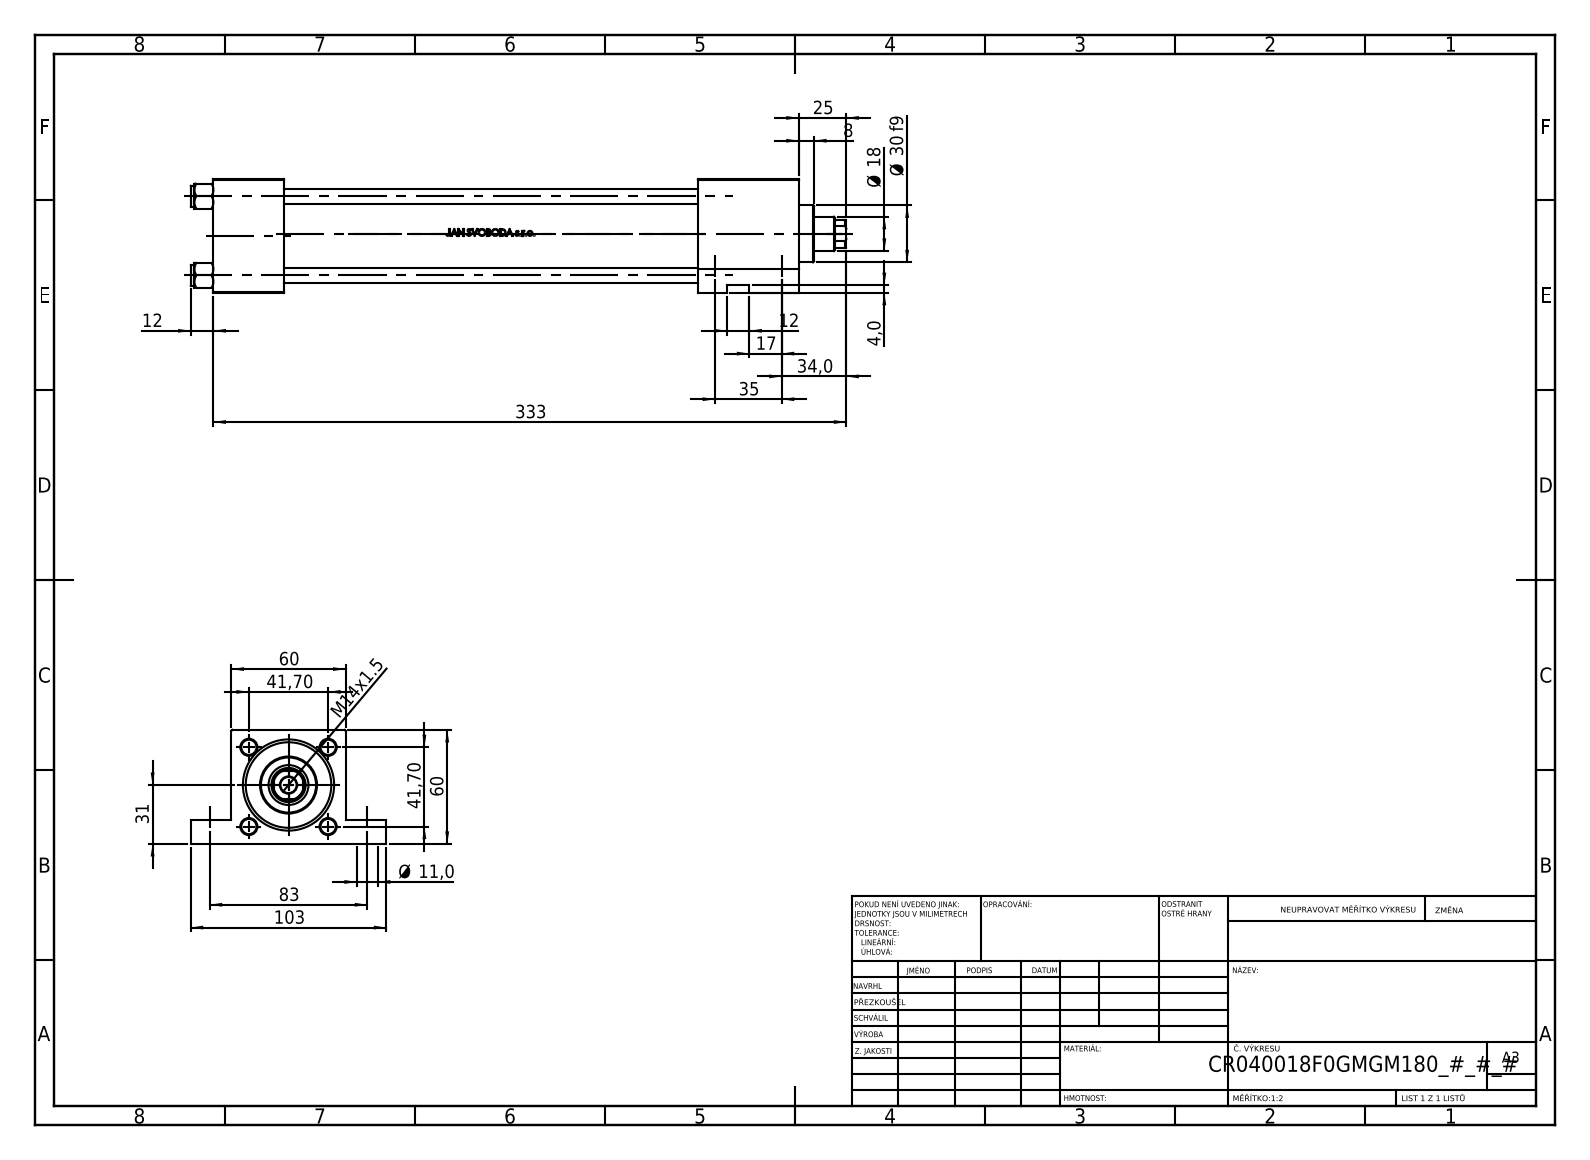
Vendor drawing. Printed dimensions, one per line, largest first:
333
103
83
60
60
41,70
41,70
35
34,0
31
Ø 30 f9
25
Ø 18
17
M14x1.5
12
12
Ø 11,0
8
4,0
